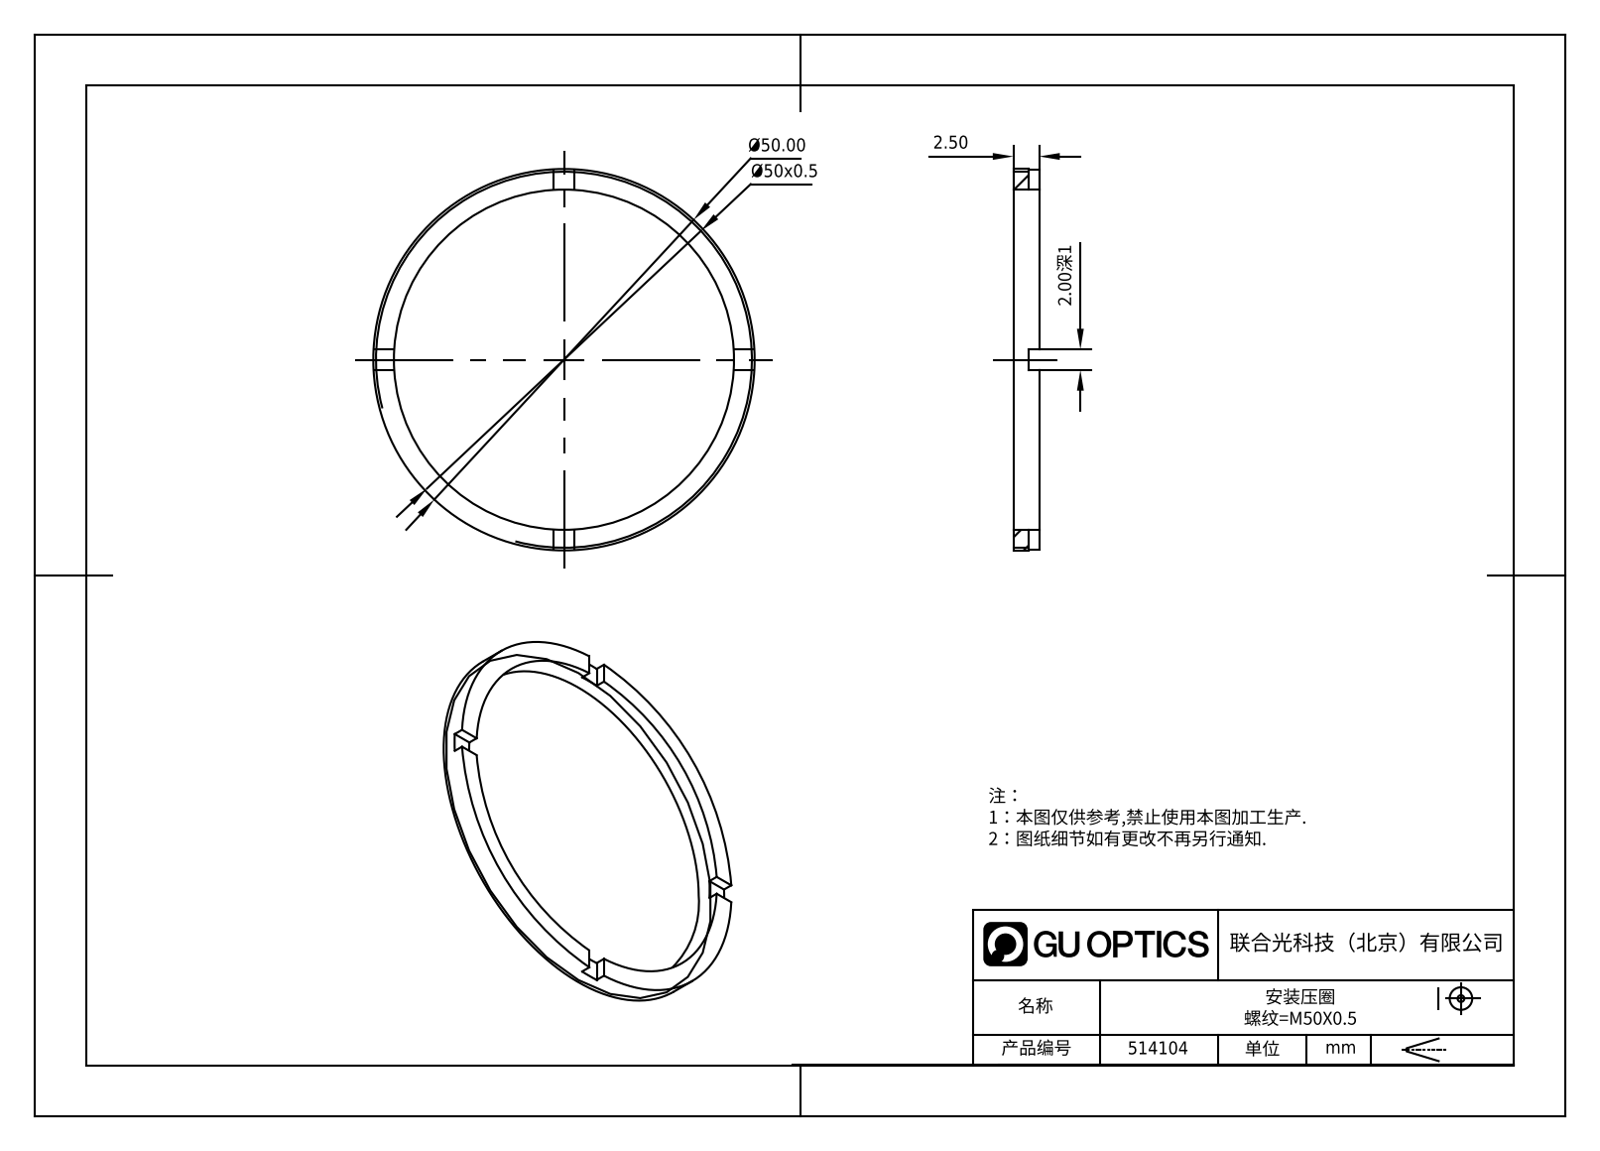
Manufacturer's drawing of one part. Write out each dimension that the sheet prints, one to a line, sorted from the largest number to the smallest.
Ø50.00
Ø50x0.5
2.50
2.00深1
